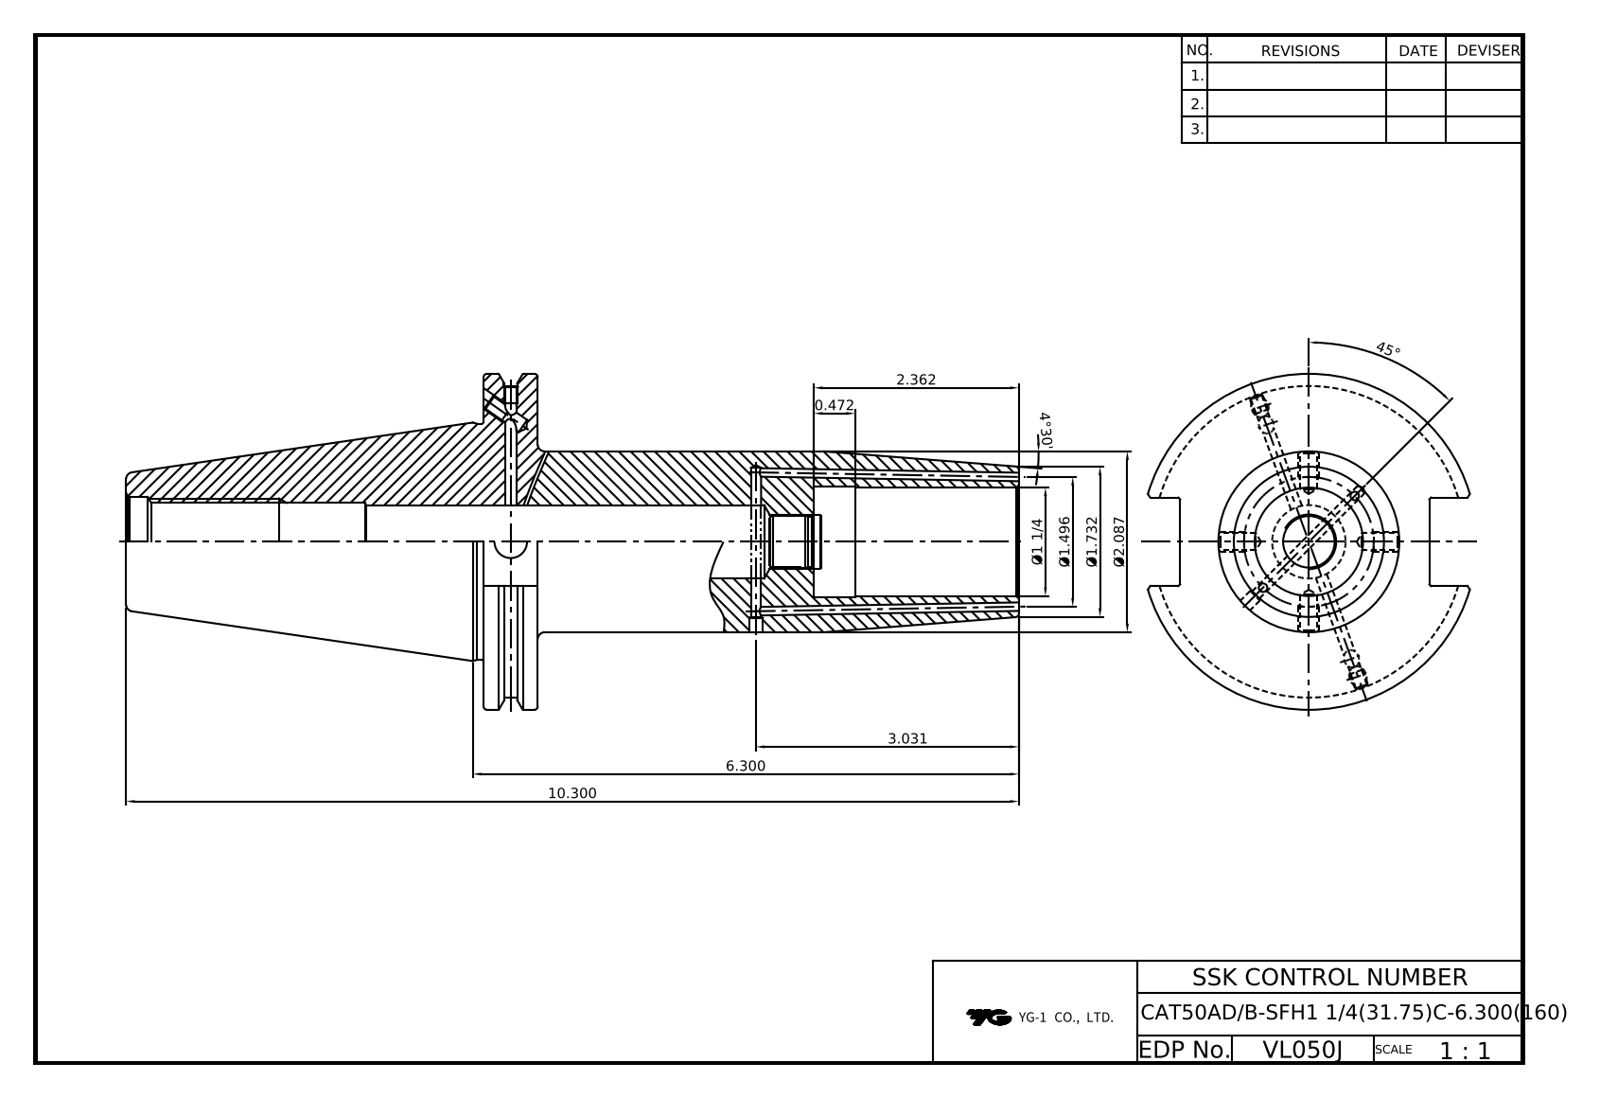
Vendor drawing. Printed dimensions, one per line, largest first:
45°
10.300
6.300
4°30'
3.031
2.362
Ø2.087
Ø1.732
Ø1.496
Ø1 1/4
0.472
